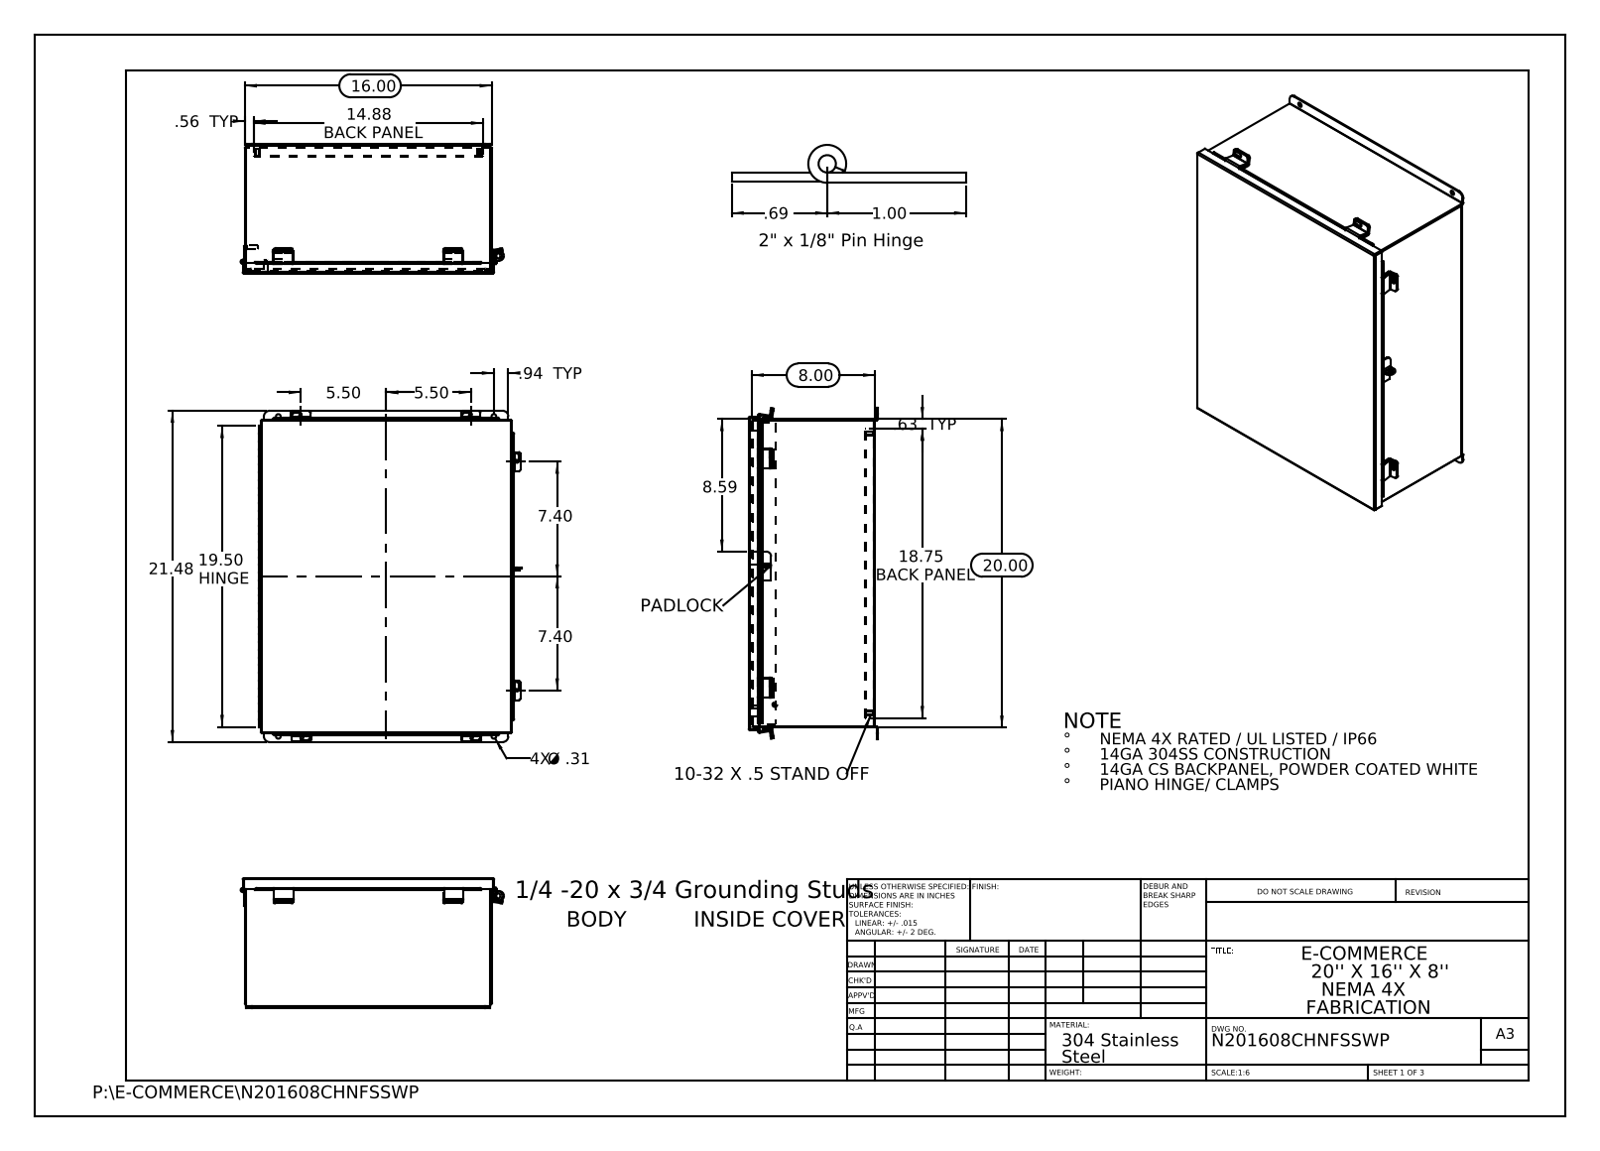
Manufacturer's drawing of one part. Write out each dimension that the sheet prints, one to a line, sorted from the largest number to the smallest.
21.48
20.00
19.50 HINGE
18.75 BACK PANEL
16.00
14.88 BACK PANEL
8.59
8.00
7.40
7.40
5.50
5.50
1.00
.94 TYP
.69
.63 TYP
.56 TYP
4X Ø .31
